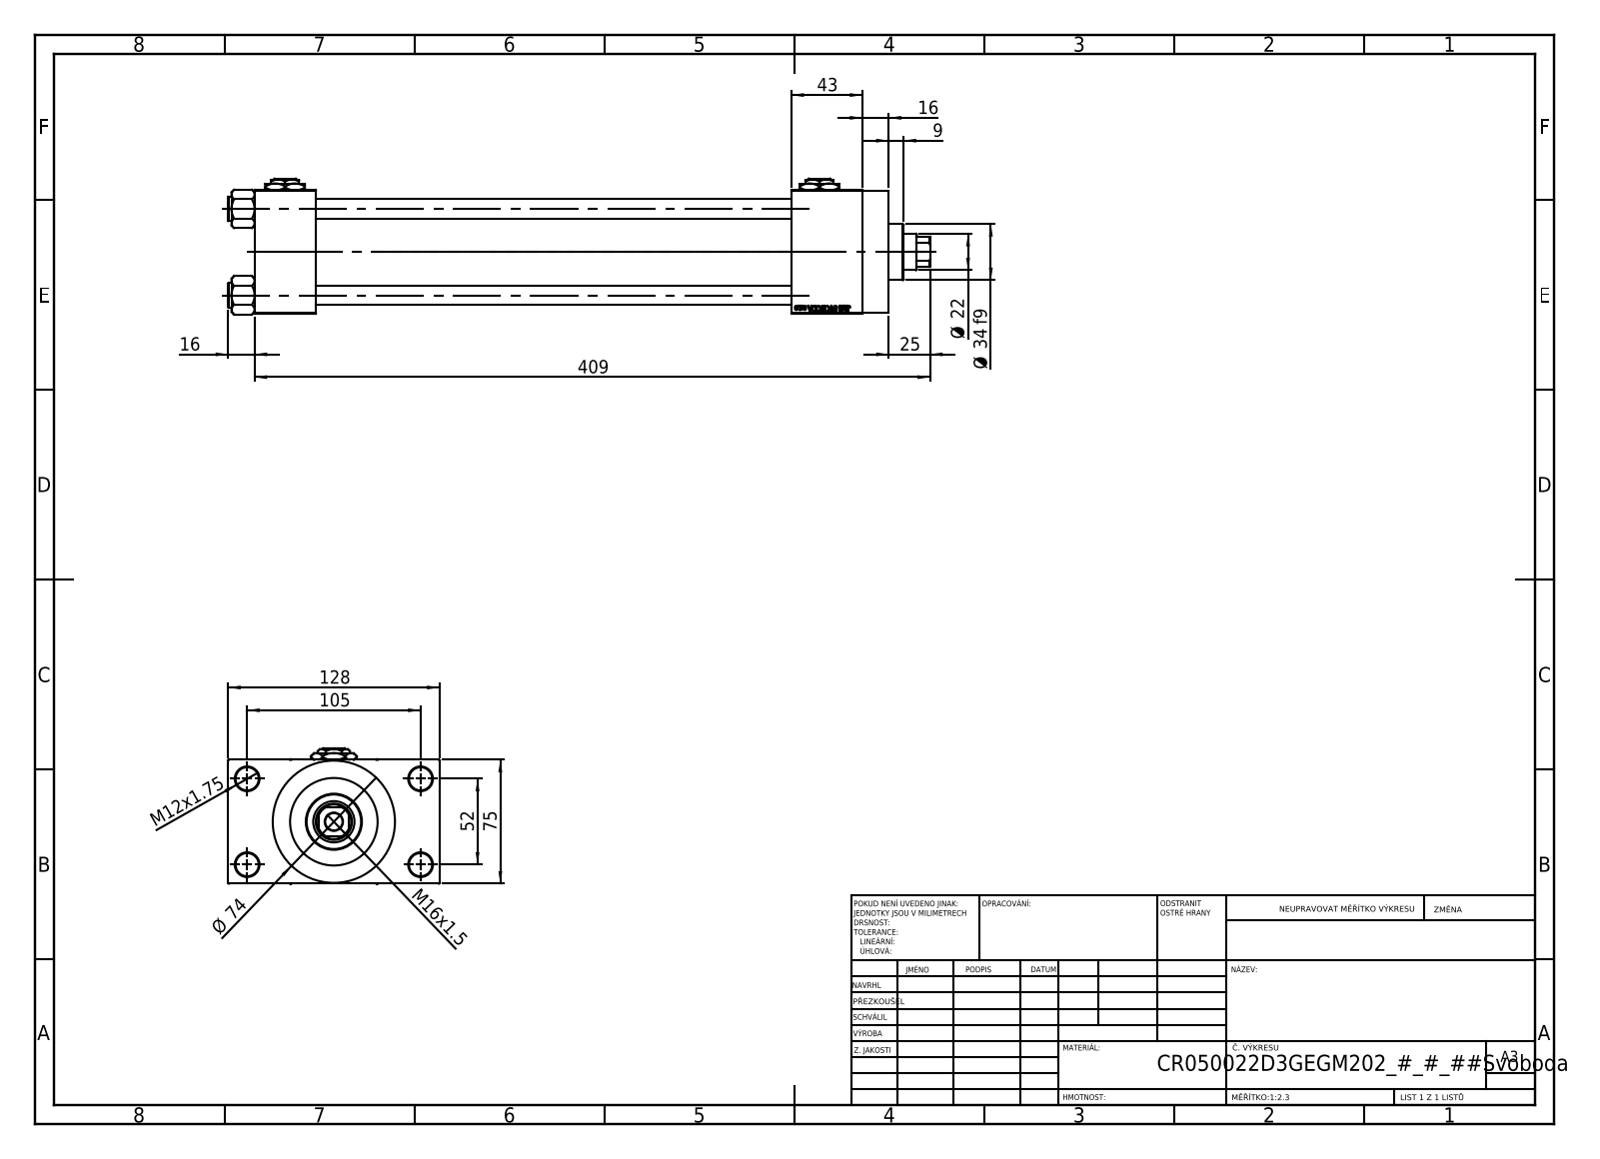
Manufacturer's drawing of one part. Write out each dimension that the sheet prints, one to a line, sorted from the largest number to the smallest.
409
128
105
75
Ø 74
52
43
Ø 34 f9
25
Ø 22
16
16
M16x1.5
M12x1.75
9
